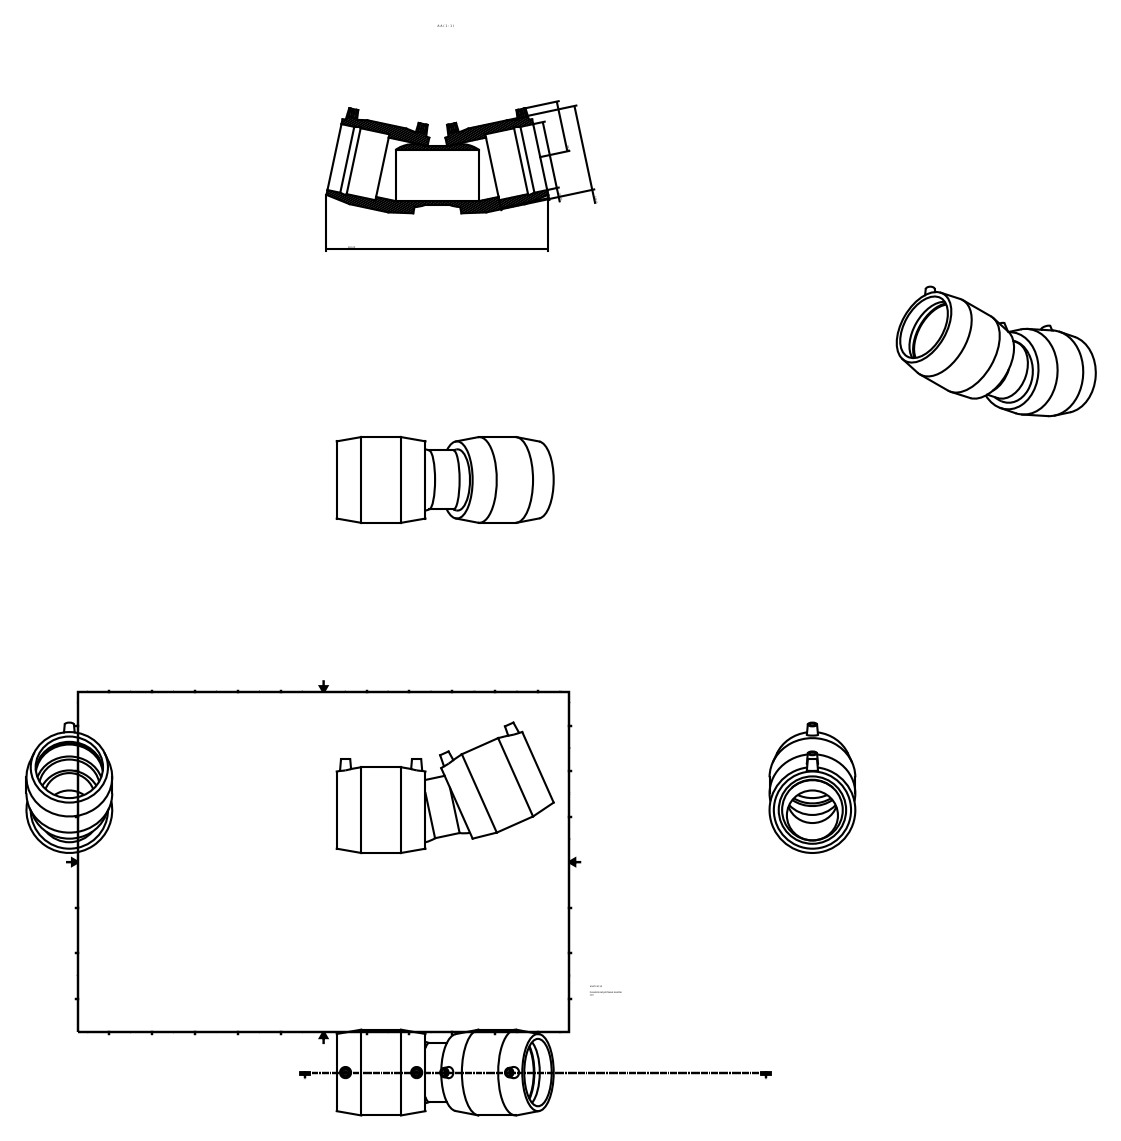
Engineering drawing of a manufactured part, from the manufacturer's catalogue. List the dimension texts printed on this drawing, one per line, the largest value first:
362,00
140,00
n110,00
83,00
80,00
